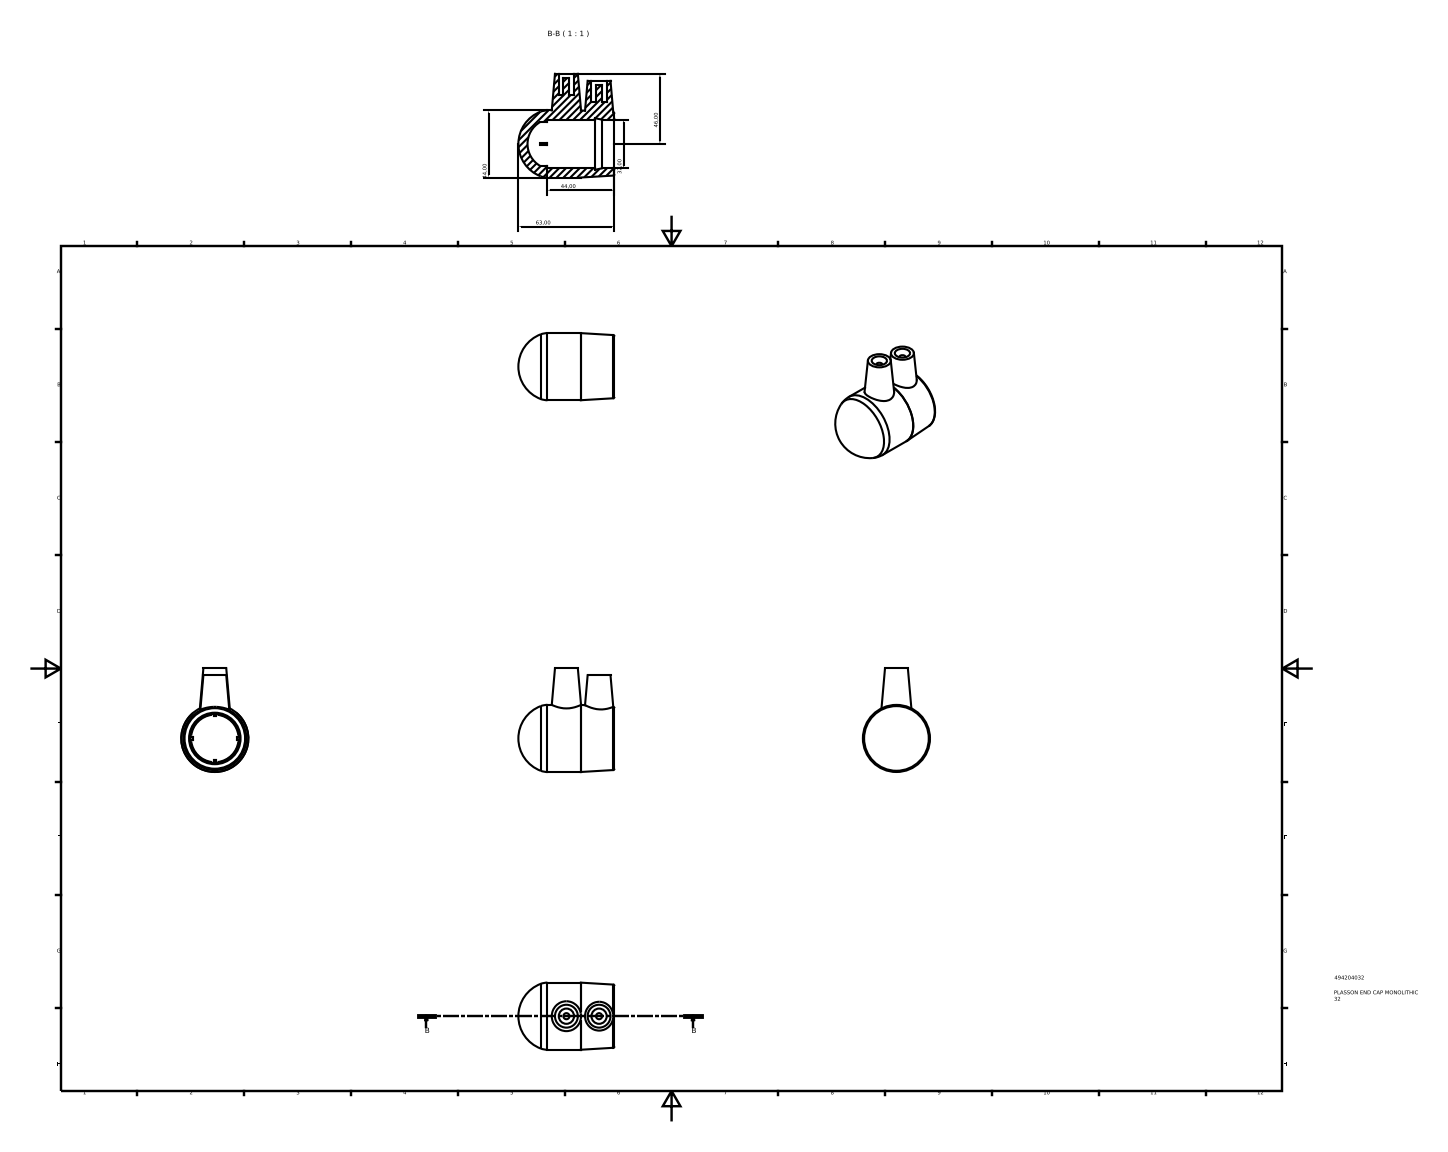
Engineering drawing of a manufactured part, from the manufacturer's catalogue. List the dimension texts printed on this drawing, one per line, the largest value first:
63,00
46,00
44,00
44,00
32,00
